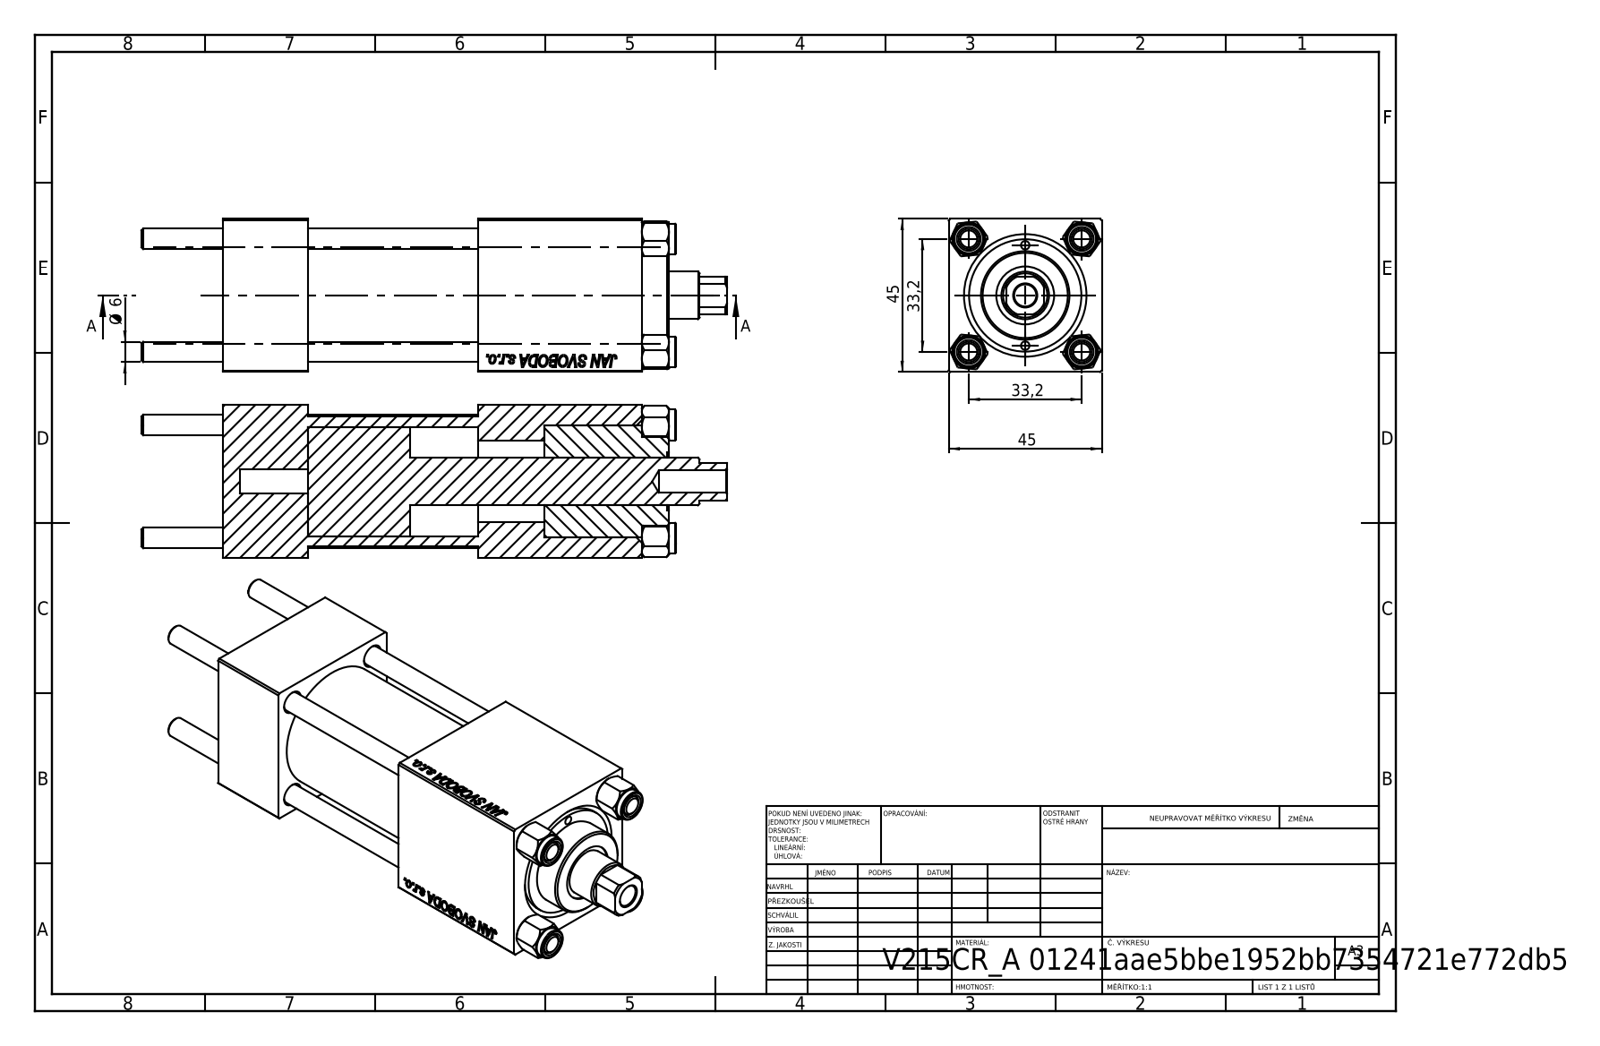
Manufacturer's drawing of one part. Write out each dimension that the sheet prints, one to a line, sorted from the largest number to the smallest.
45
45
33,2
33,2
Ø 6
